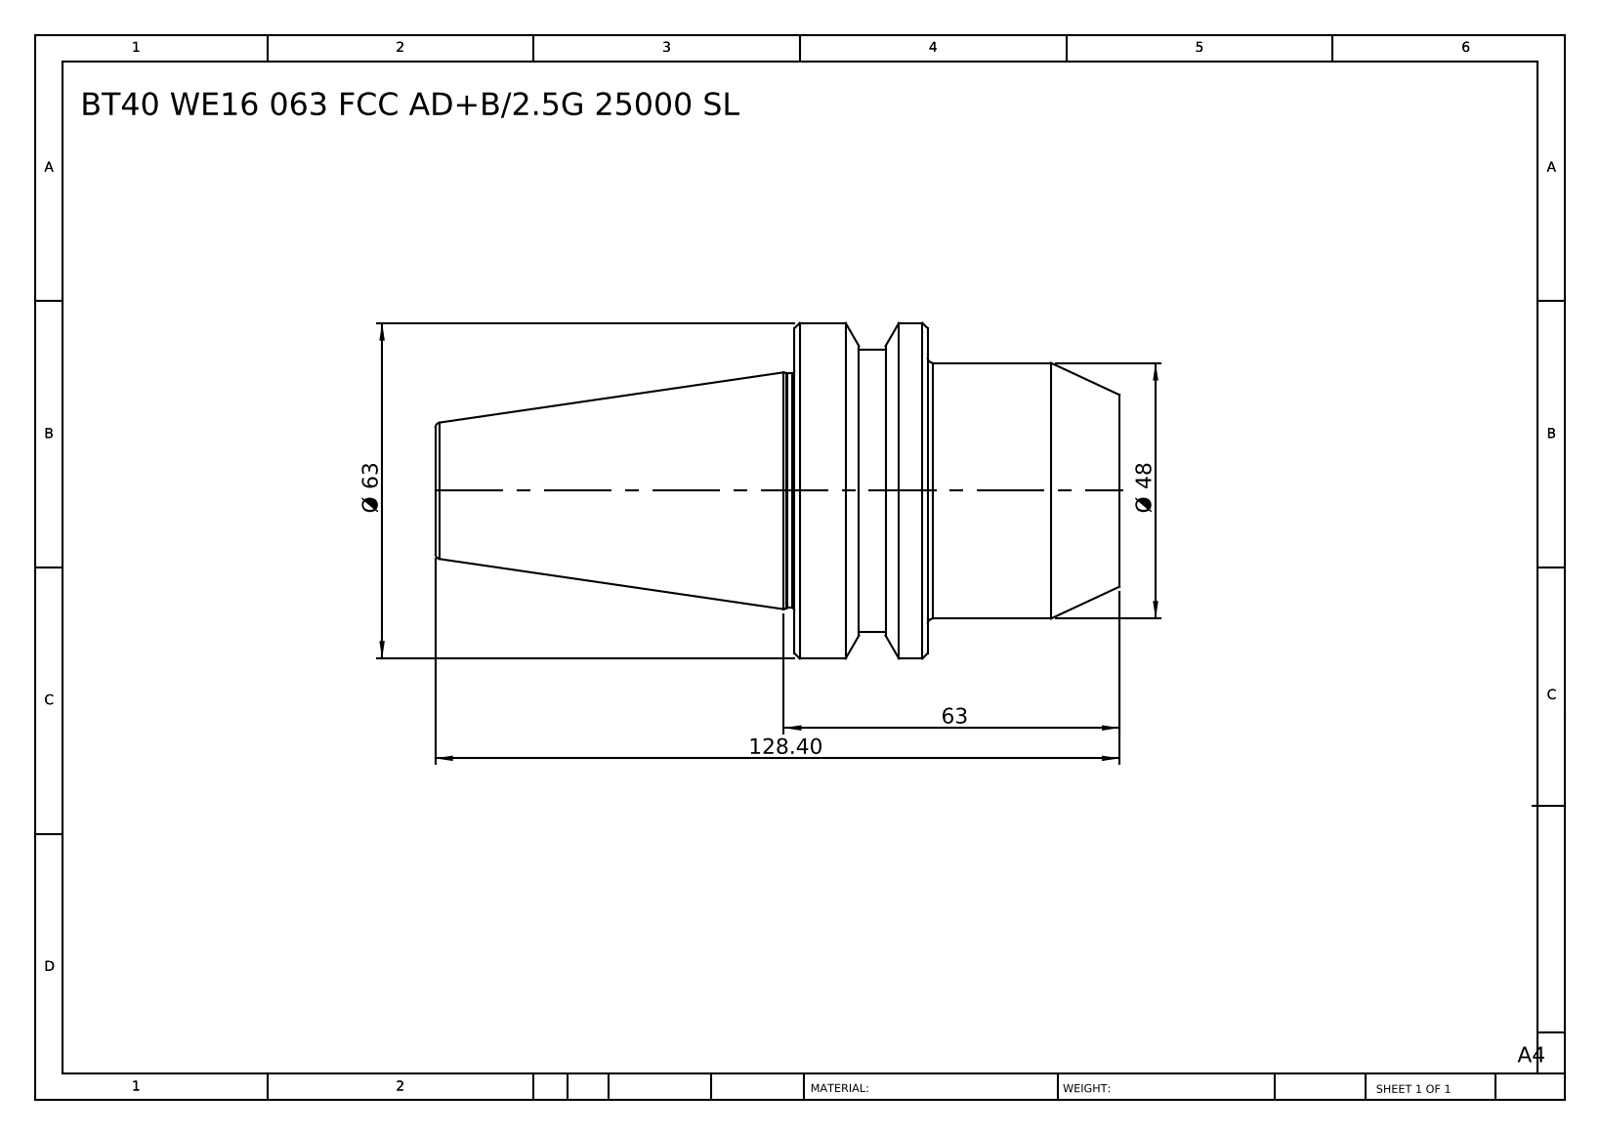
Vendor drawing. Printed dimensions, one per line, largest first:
128.40
63
Ø 63
Ø 48
